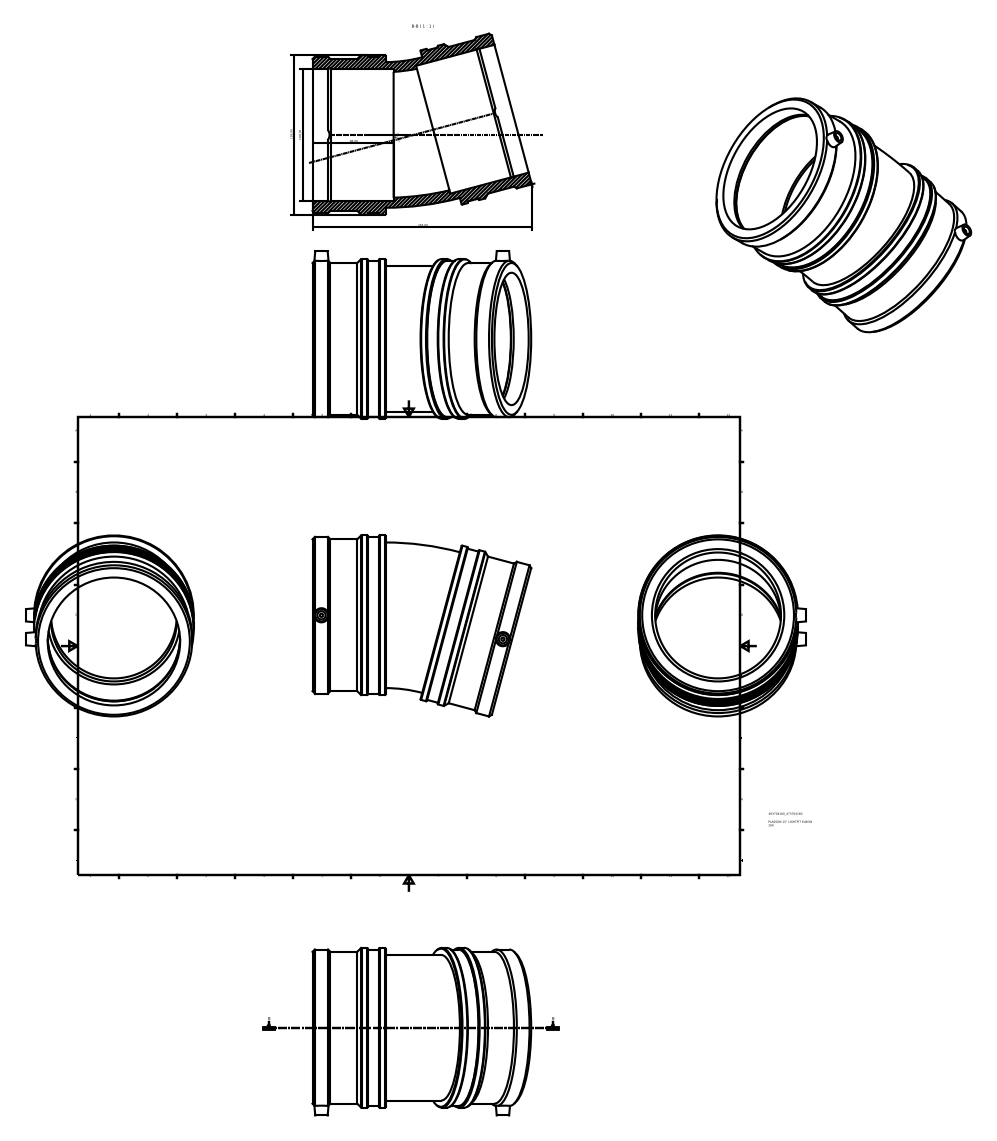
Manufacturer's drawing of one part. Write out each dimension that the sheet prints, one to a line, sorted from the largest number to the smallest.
265,00
193,00
n160,00
98,00
15,00°
